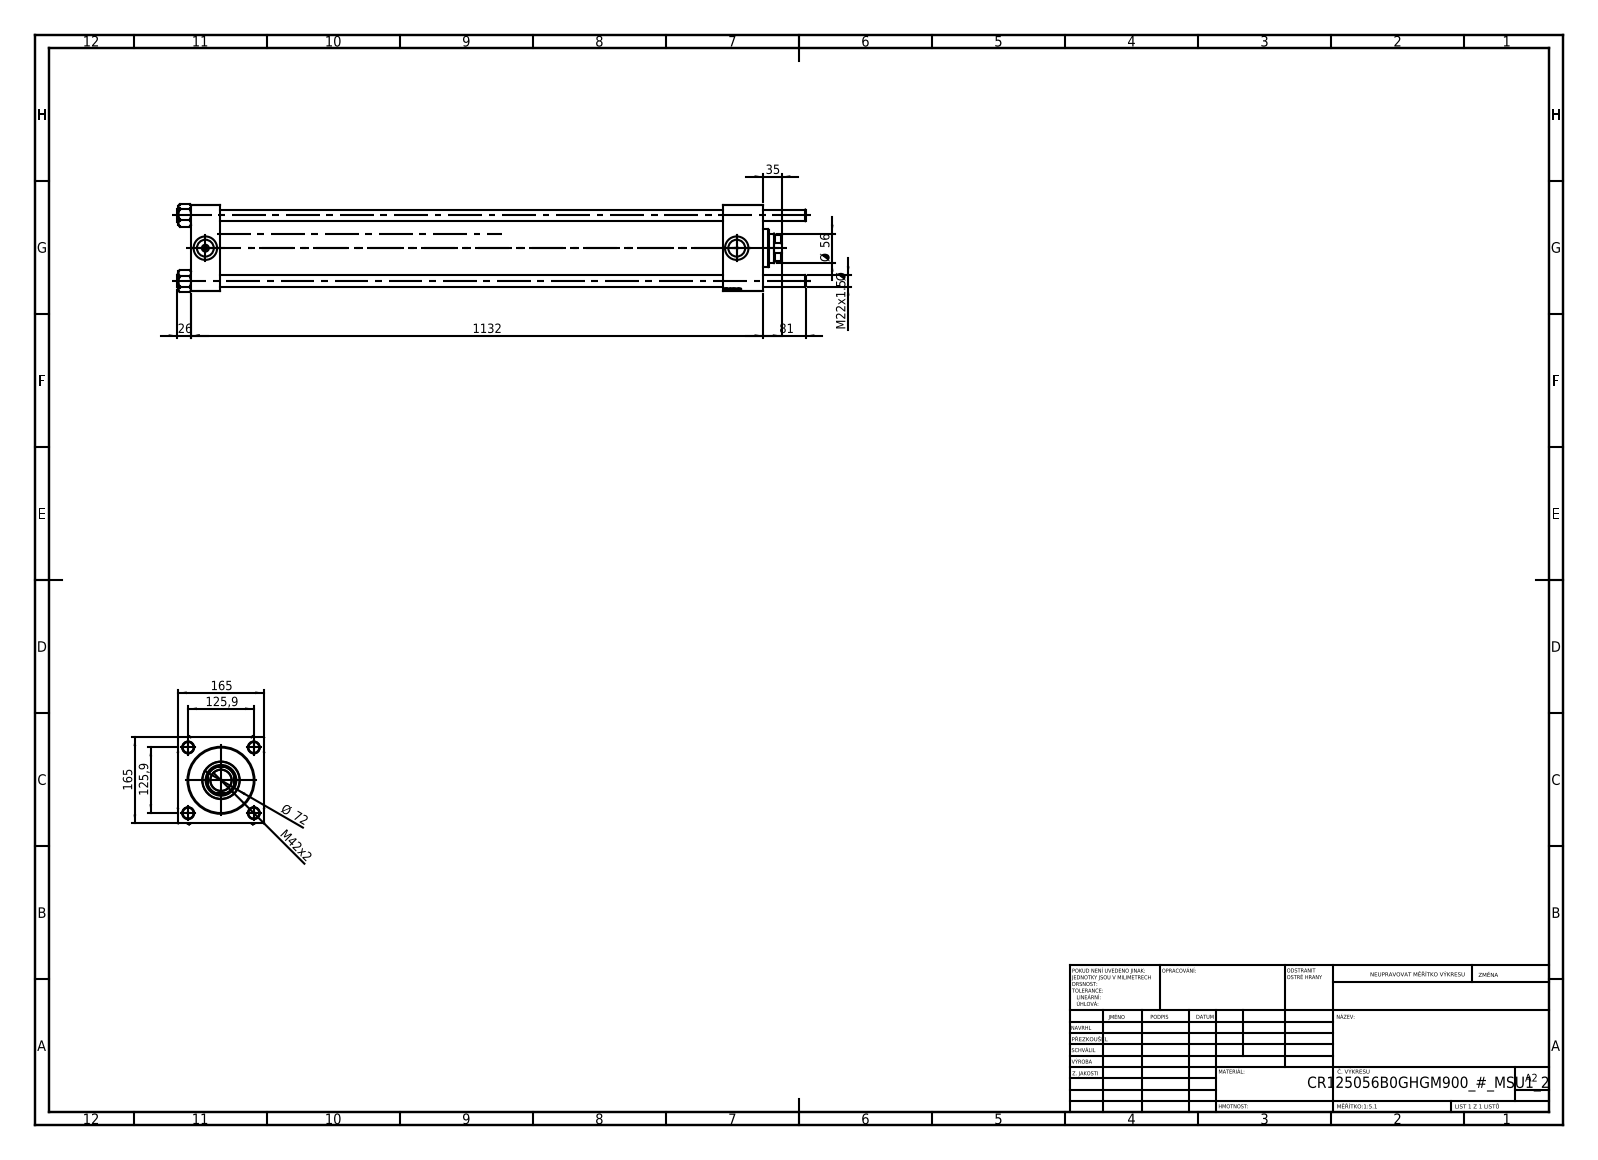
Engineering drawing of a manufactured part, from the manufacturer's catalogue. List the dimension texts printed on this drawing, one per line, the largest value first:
1132
165
165
125,9
125,9
81
Ø 72
Ø 56
M42x2
35
26
M22x1.5 Ø
